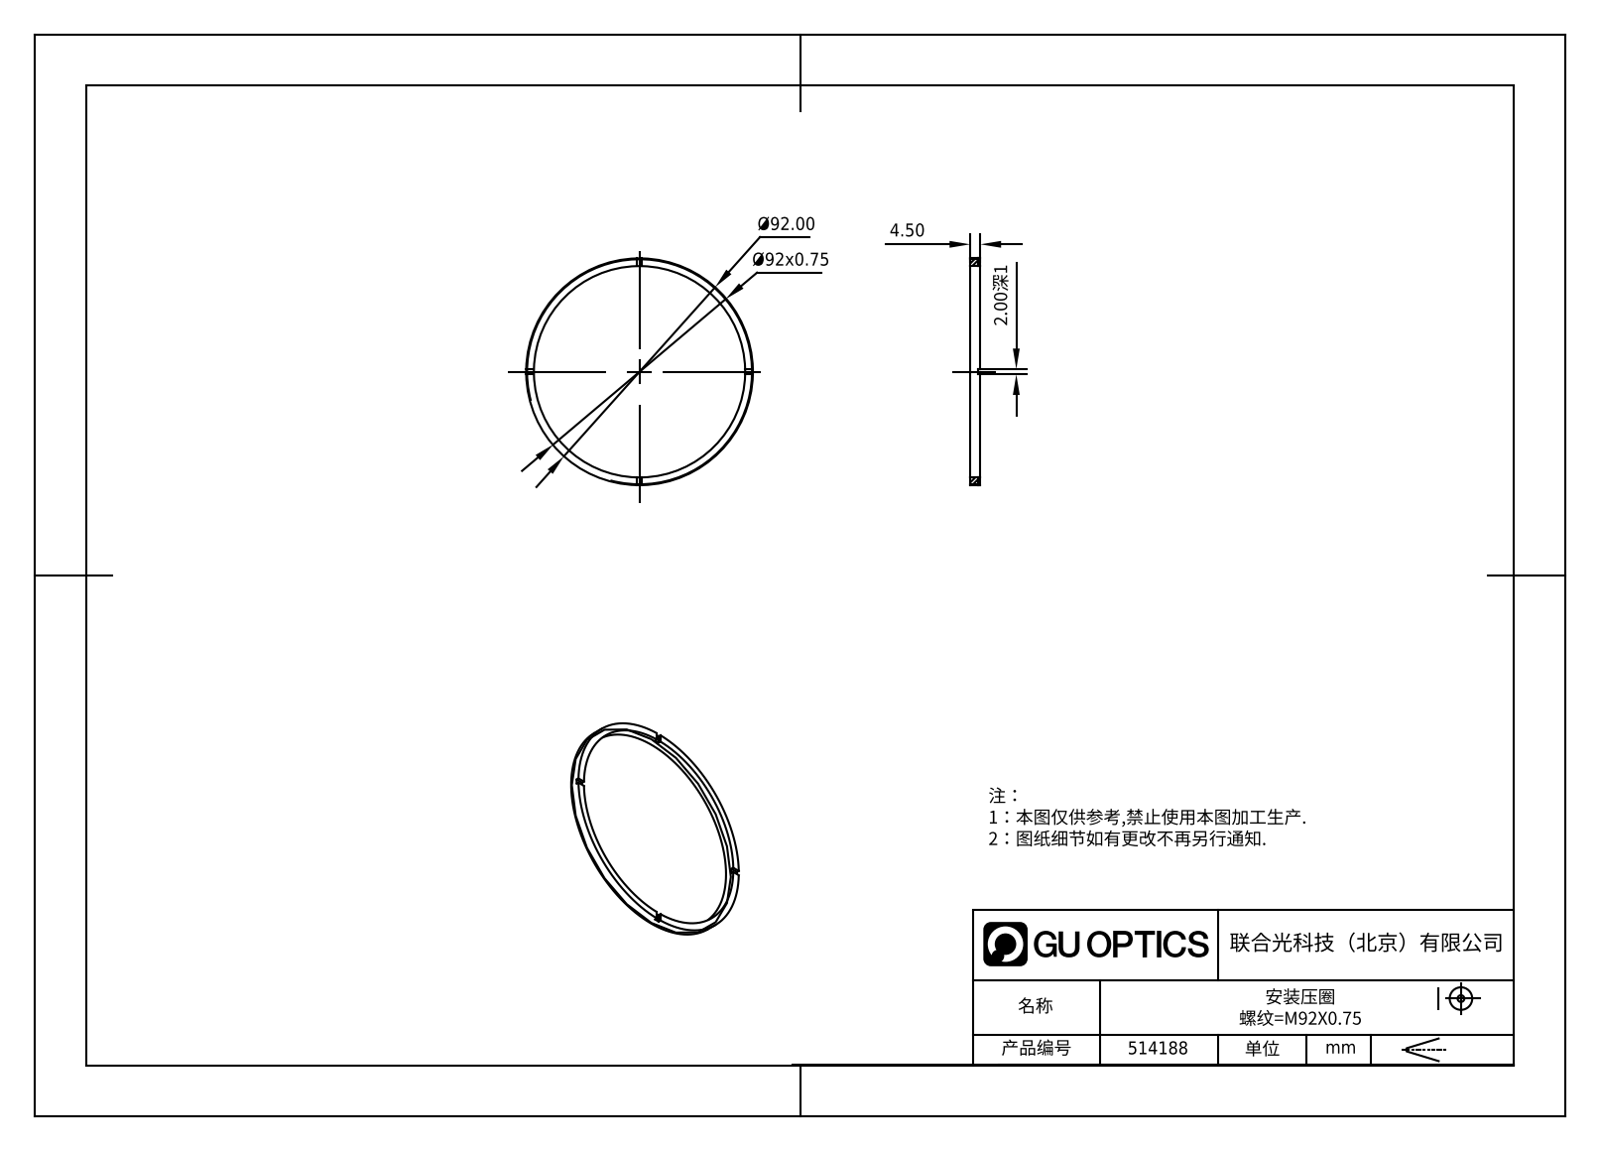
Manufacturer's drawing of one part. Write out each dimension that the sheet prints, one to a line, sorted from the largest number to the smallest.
Ø92.00
Ø92x0.75
4.50
2.00深1
